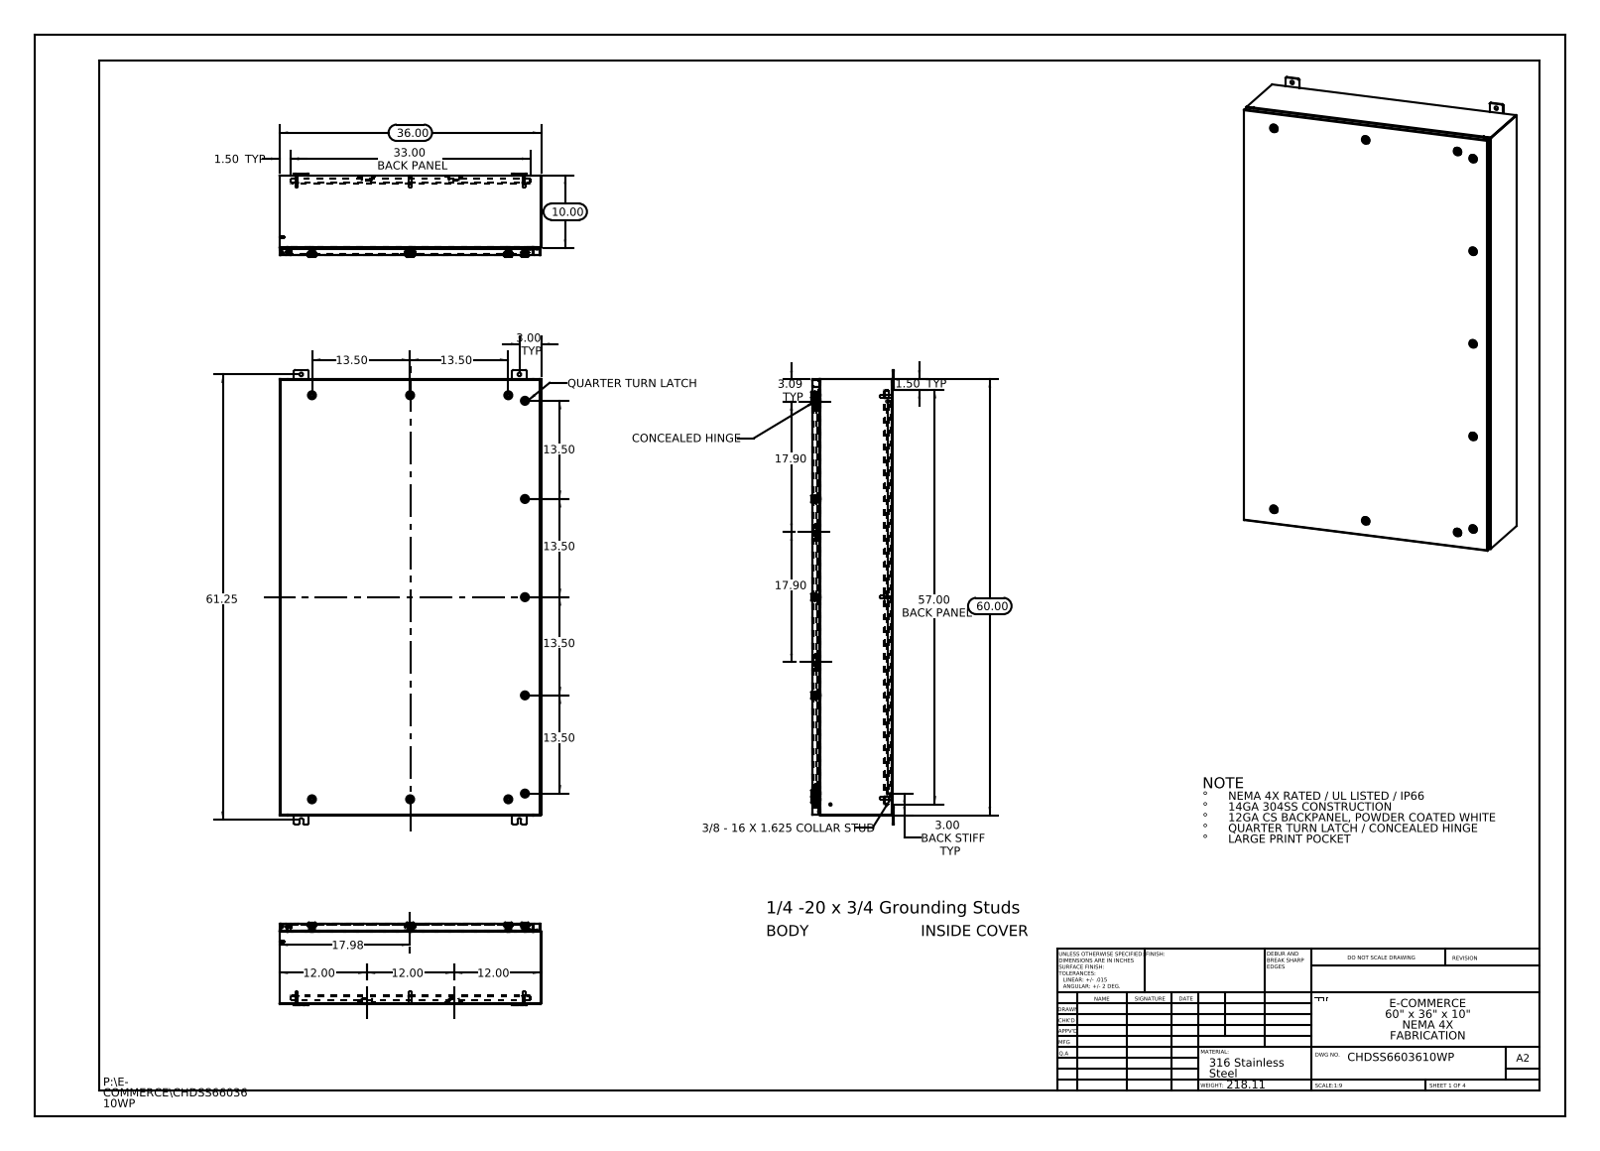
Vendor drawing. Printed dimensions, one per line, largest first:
61.25
60.00
57.00 BACK PANEL
36.00
33.00 BACK PANEL
17.98
17.90
17.90
13.50
13.50
13.50
13.50
13.50
13.50
12.00
12.00
12.00
10.00
3.09 TYP
3.00 TYP
3.00 BACK STIFF TYP
1.50 TYP
1.50 TYP
